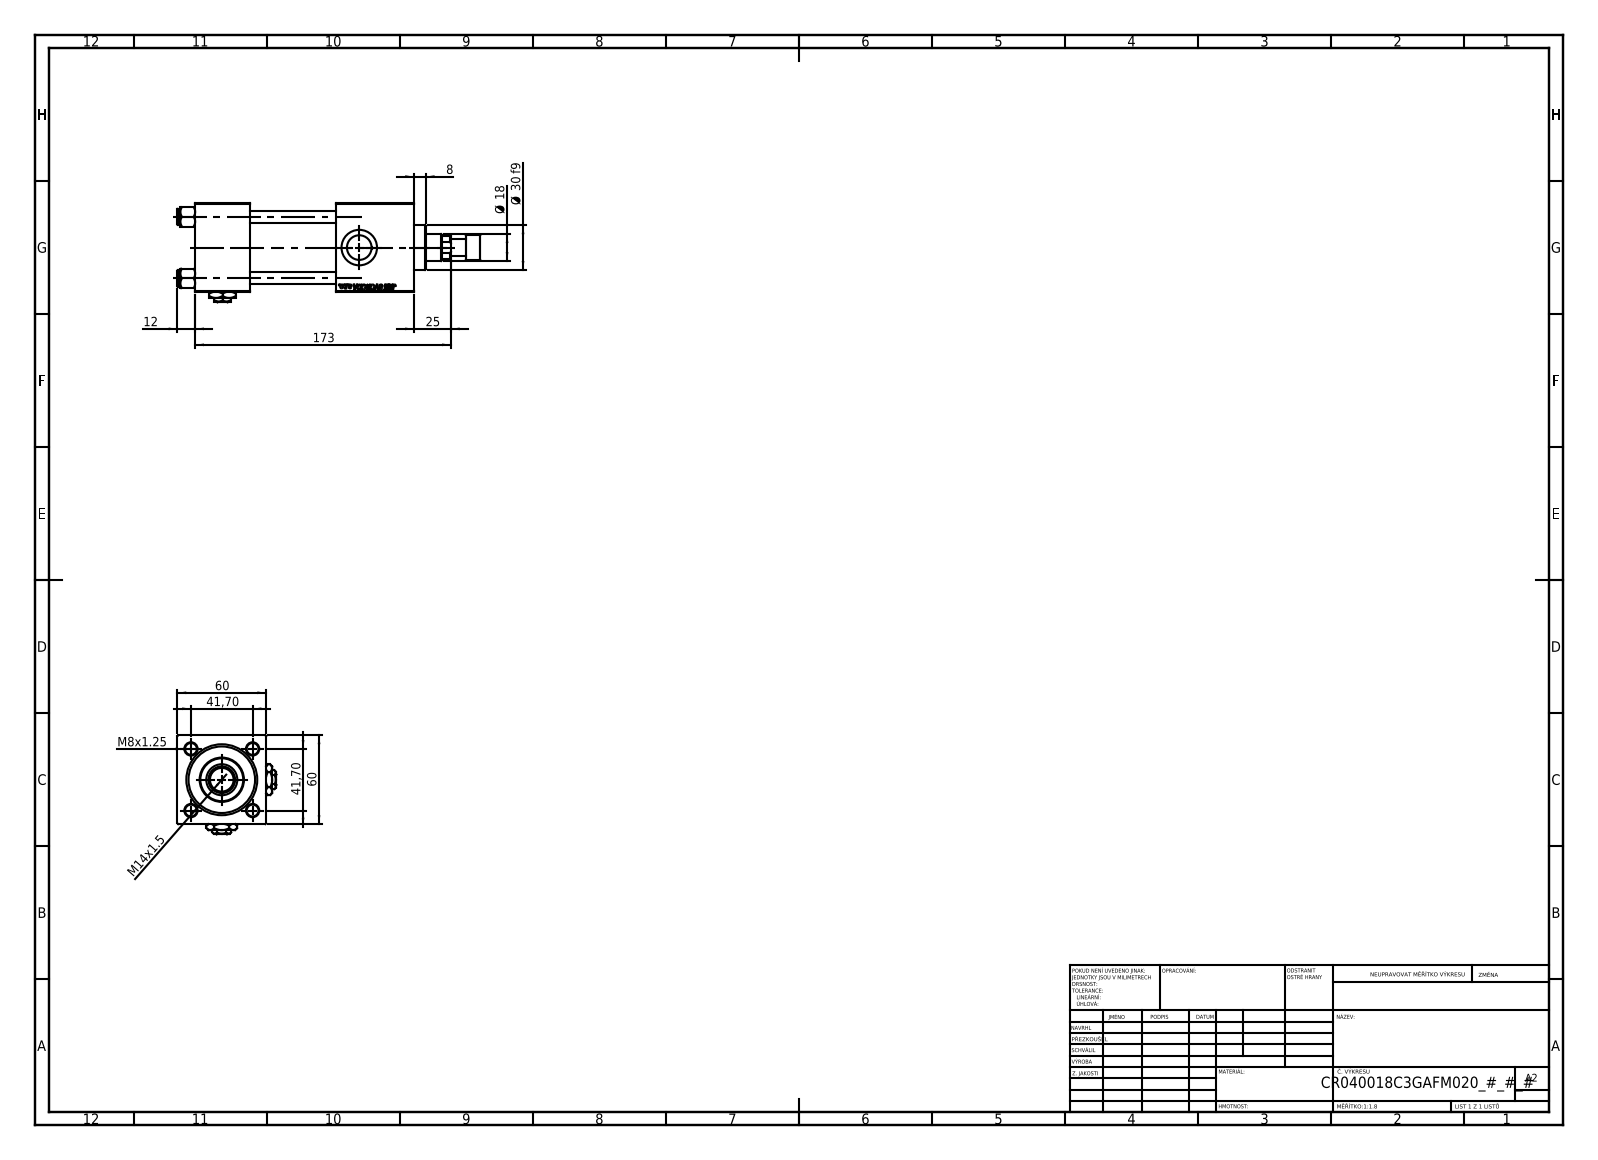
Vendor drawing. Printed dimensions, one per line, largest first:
173
60
60
41,70
41,70
Ø 30 f9
25
Ø 18
M14x1.5
12
8
M8x1.25
